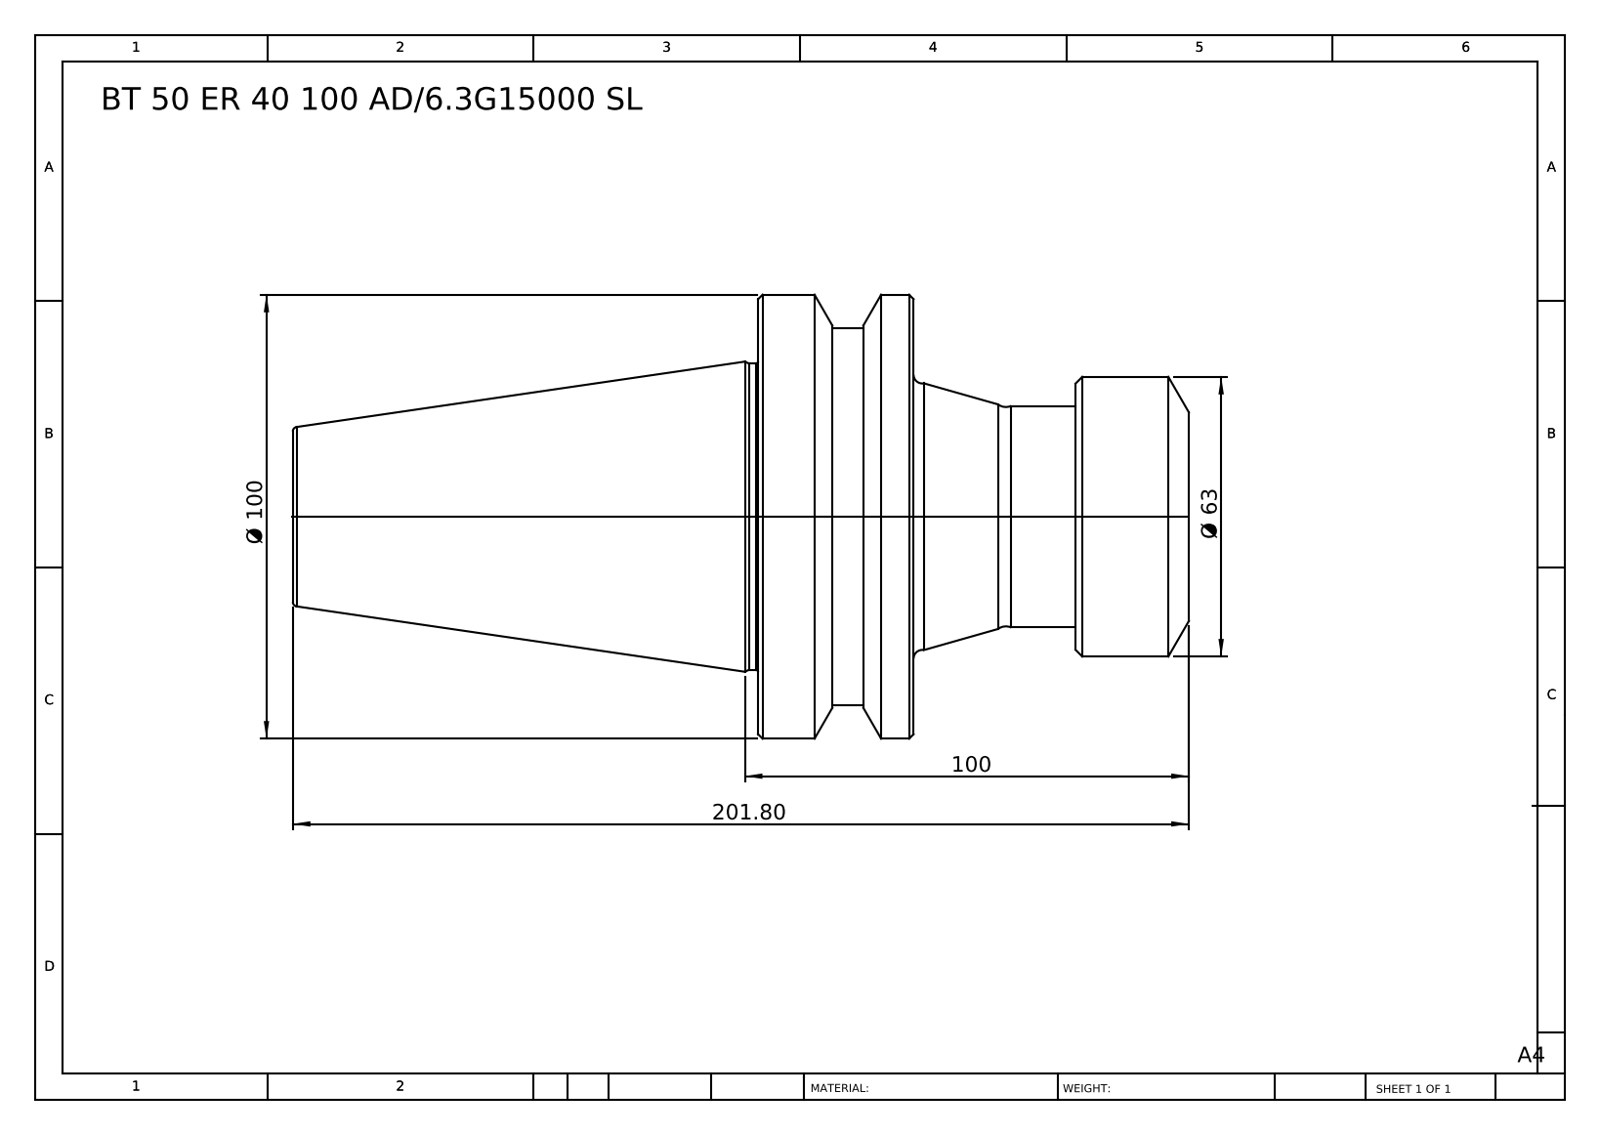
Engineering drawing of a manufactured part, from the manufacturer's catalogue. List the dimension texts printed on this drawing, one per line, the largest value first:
201.80
100
Ø 100
Ø 63
